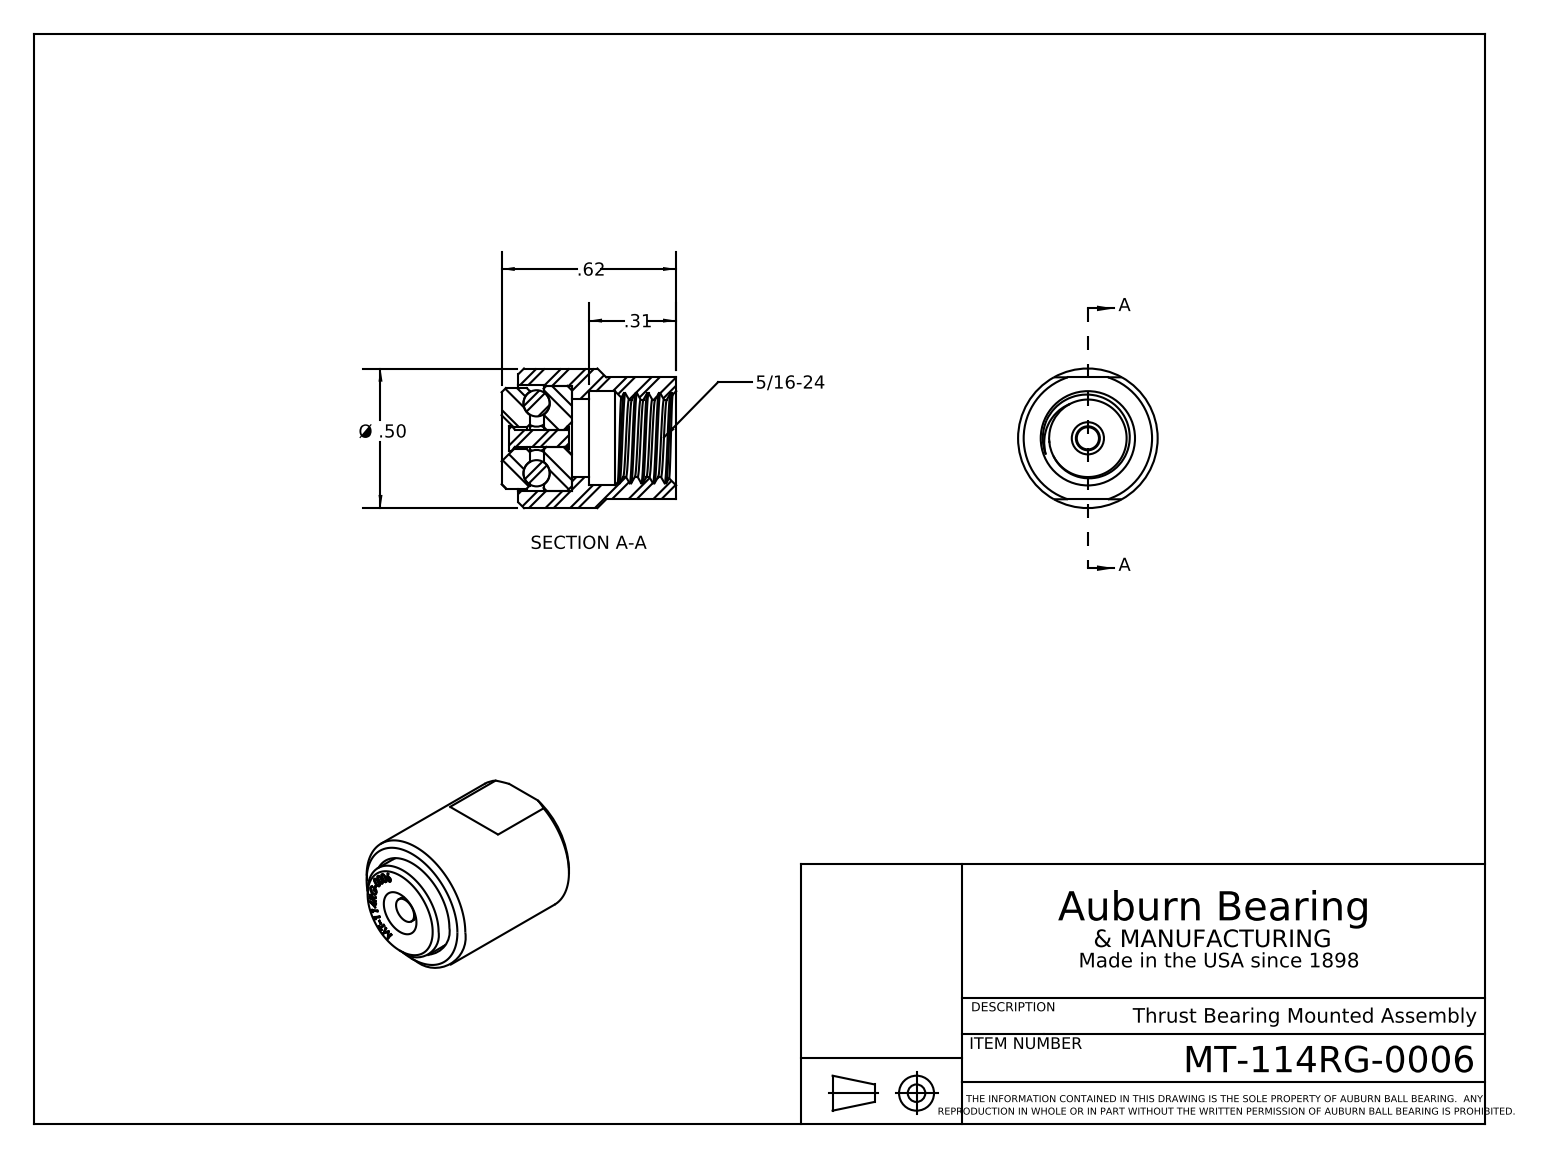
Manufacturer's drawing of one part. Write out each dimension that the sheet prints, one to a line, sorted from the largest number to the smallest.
.62
Ø .50
.31
